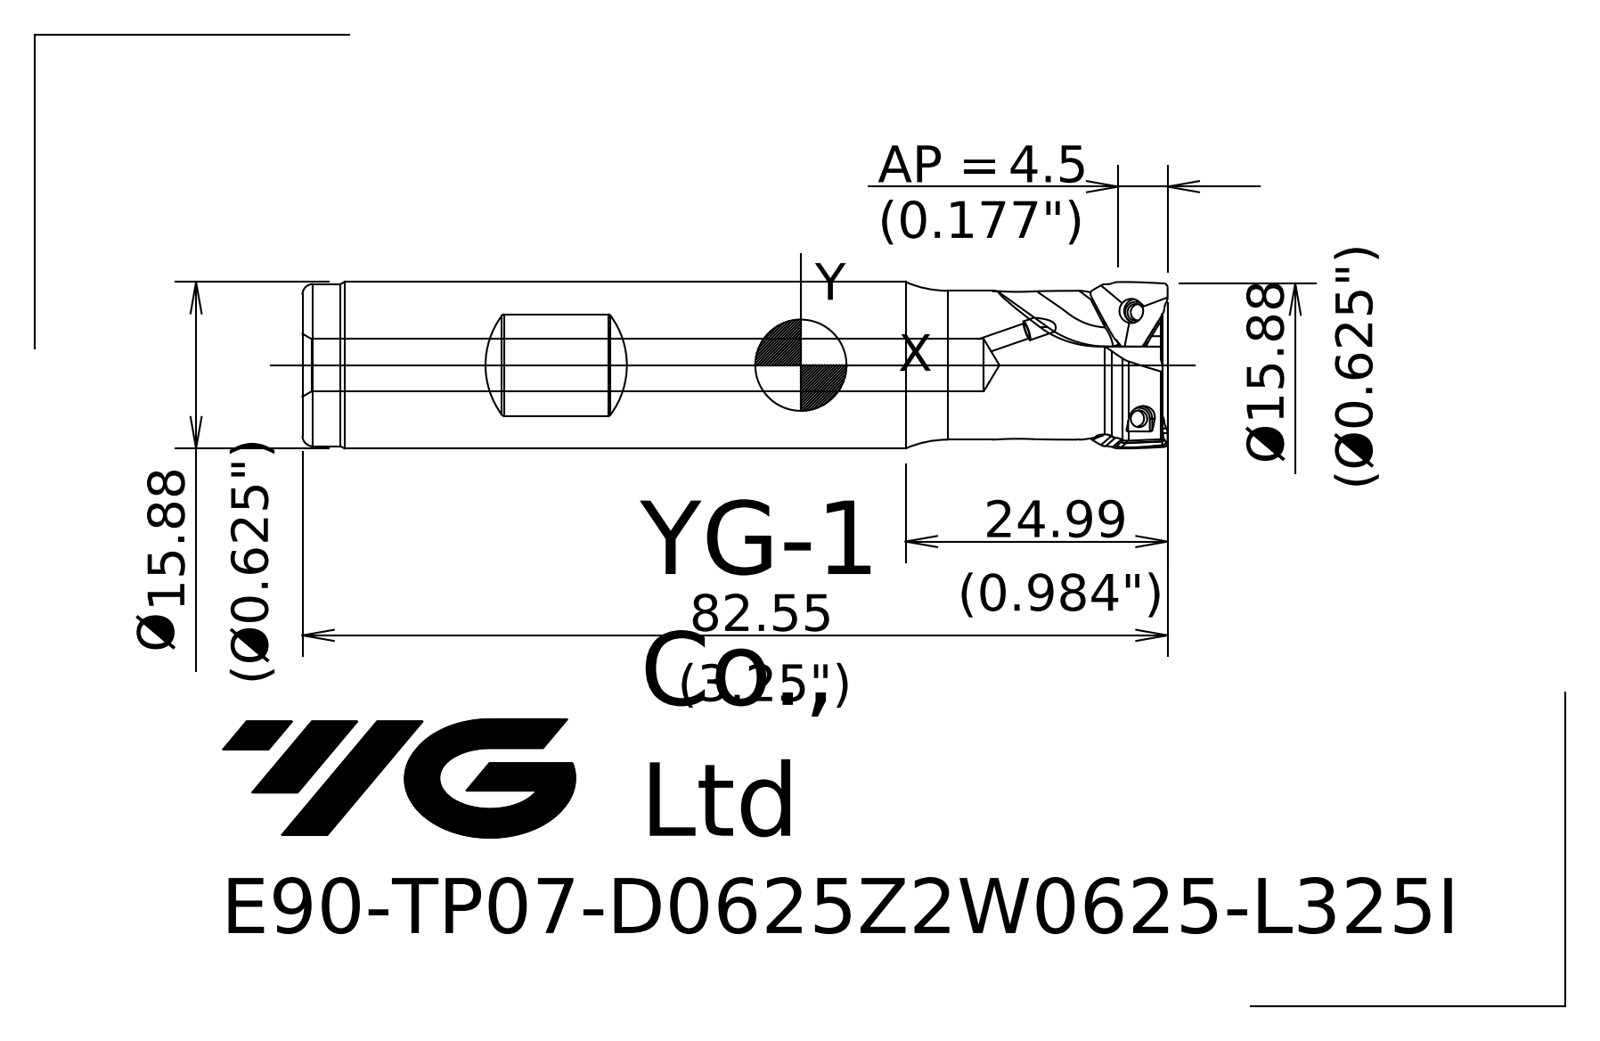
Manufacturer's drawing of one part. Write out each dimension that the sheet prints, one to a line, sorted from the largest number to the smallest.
82.55
24.99
Ø15.88
4.5 AP =
